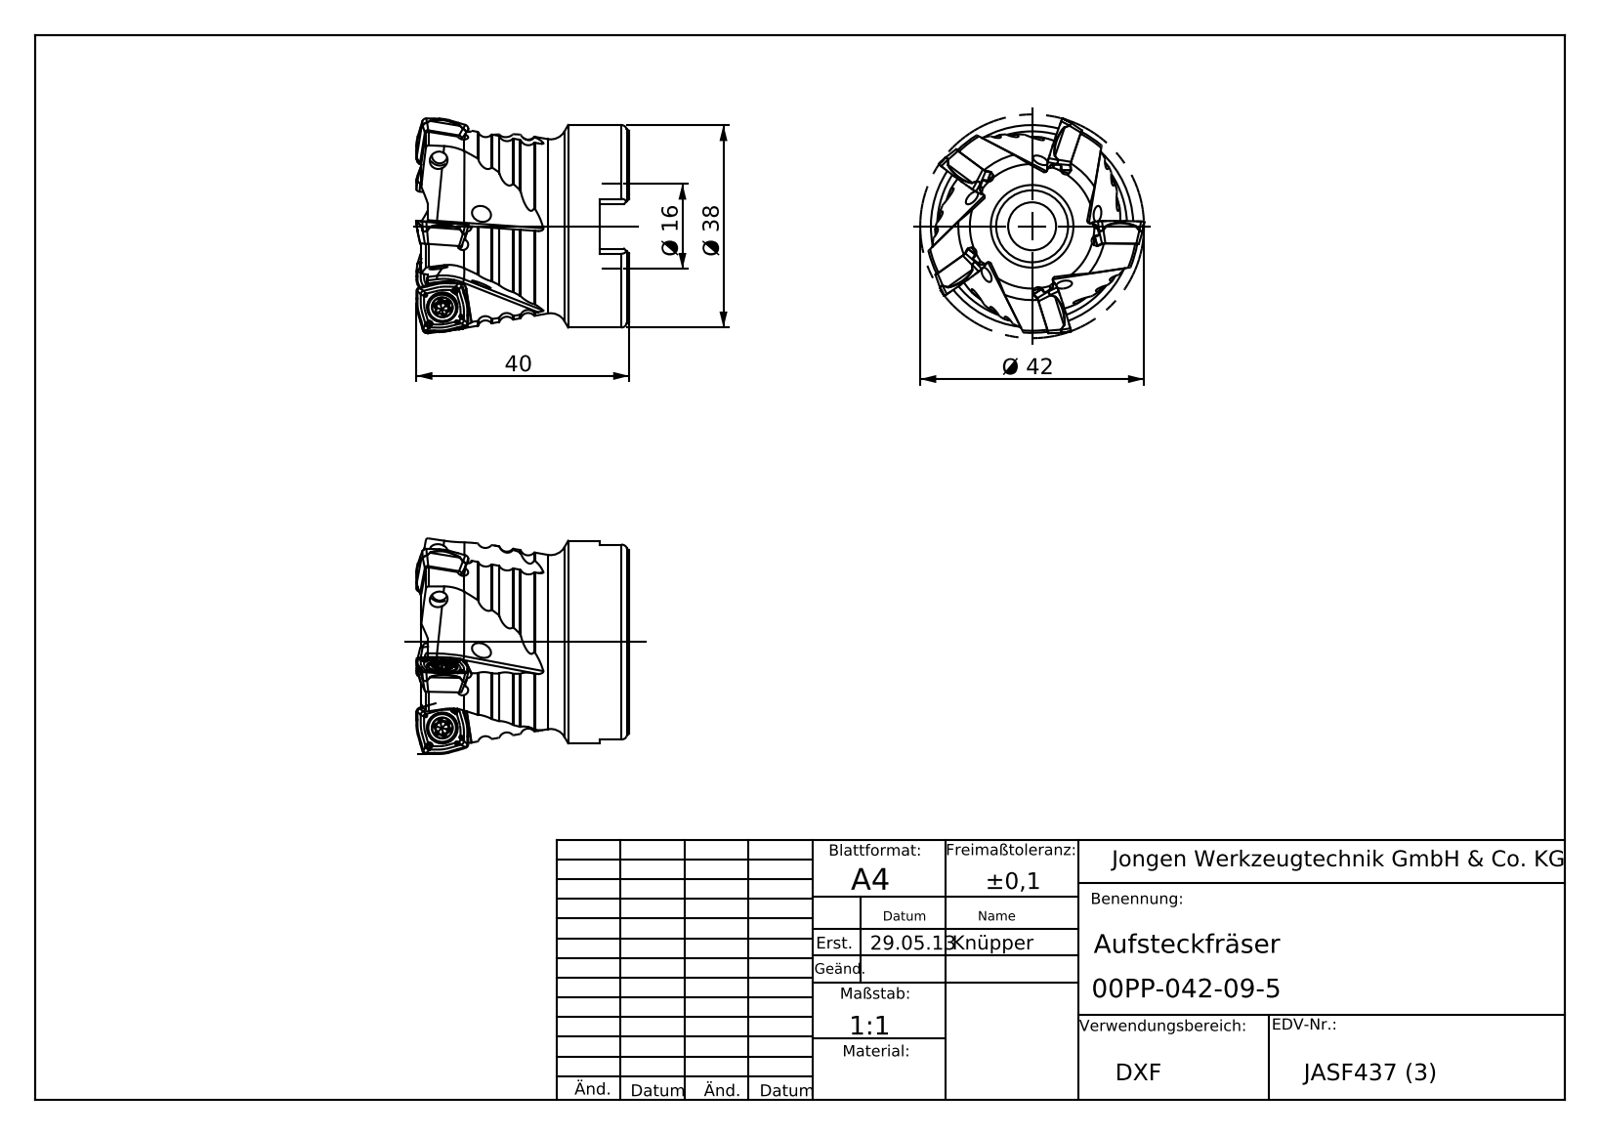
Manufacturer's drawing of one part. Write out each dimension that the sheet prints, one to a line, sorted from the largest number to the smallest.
Ø 42
40
Ø 38
Ø 16
